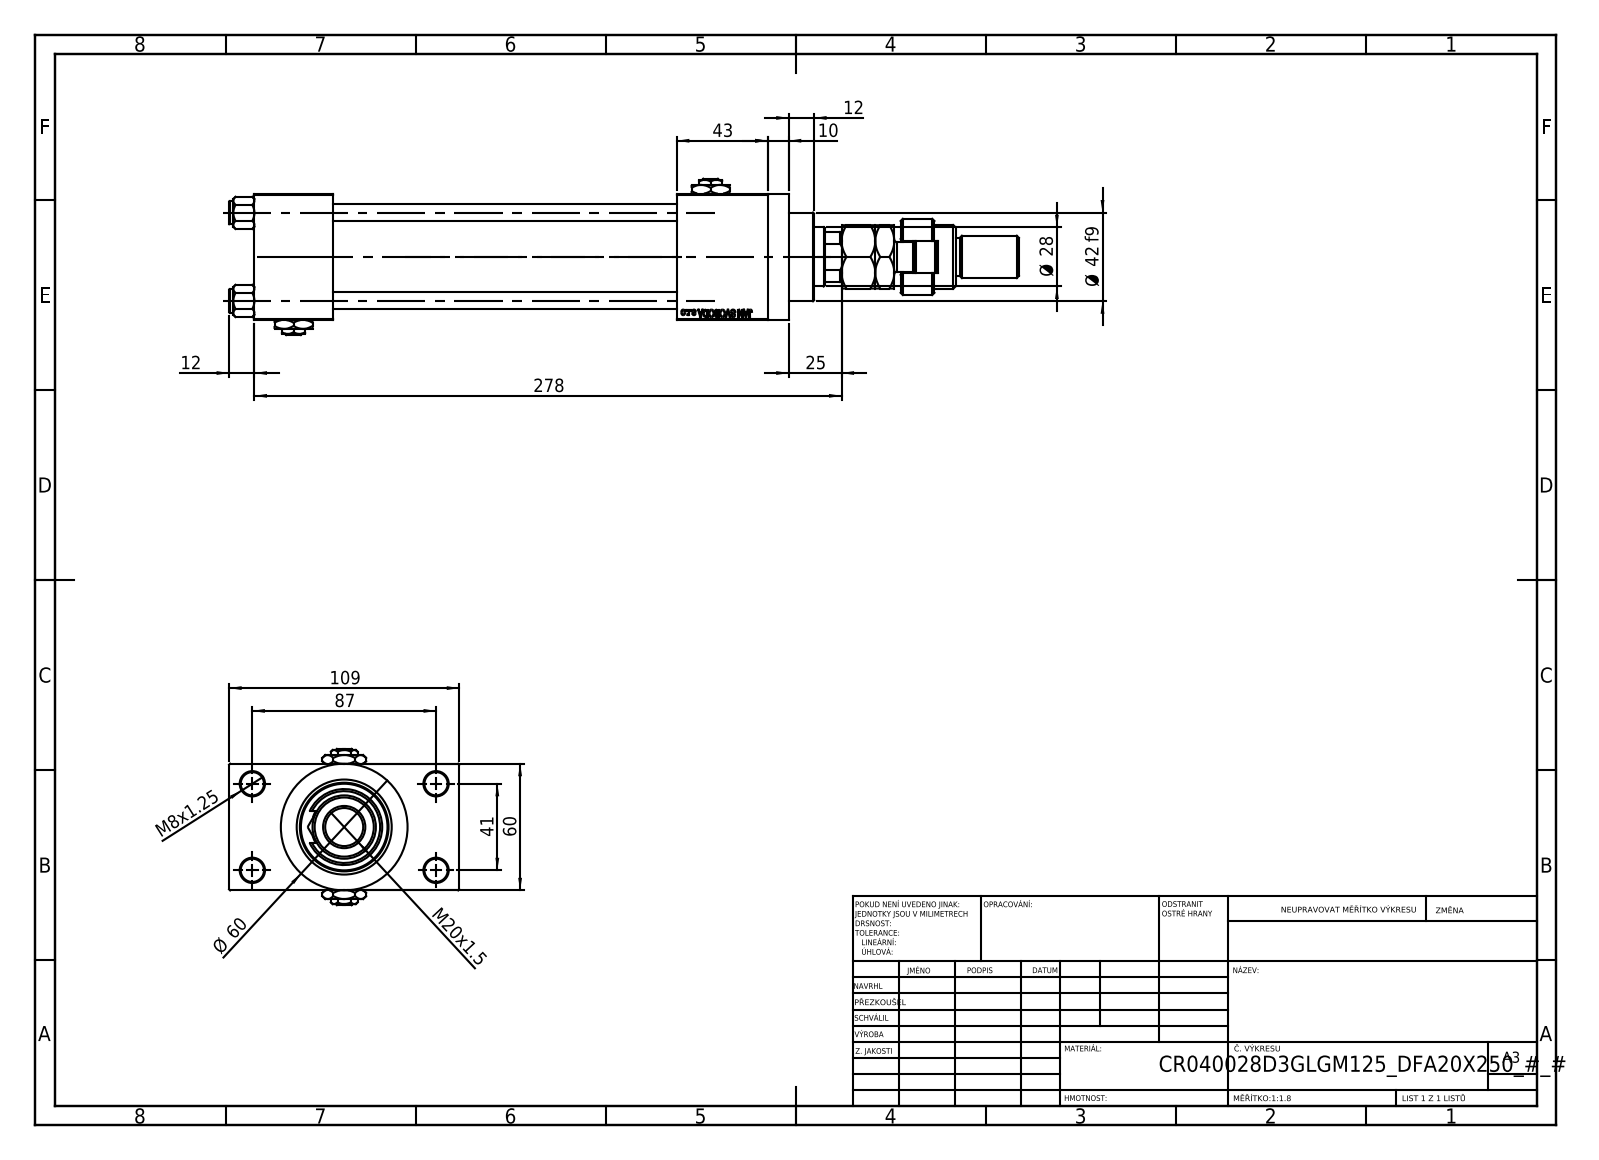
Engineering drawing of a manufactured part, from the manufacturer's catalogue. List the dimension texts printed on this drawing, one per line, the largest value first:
278
109
87
Ø 60
60
43
Ø 42 f9
41
Ø 28
25
M20x1.5
12
12
10
M8x1.25
